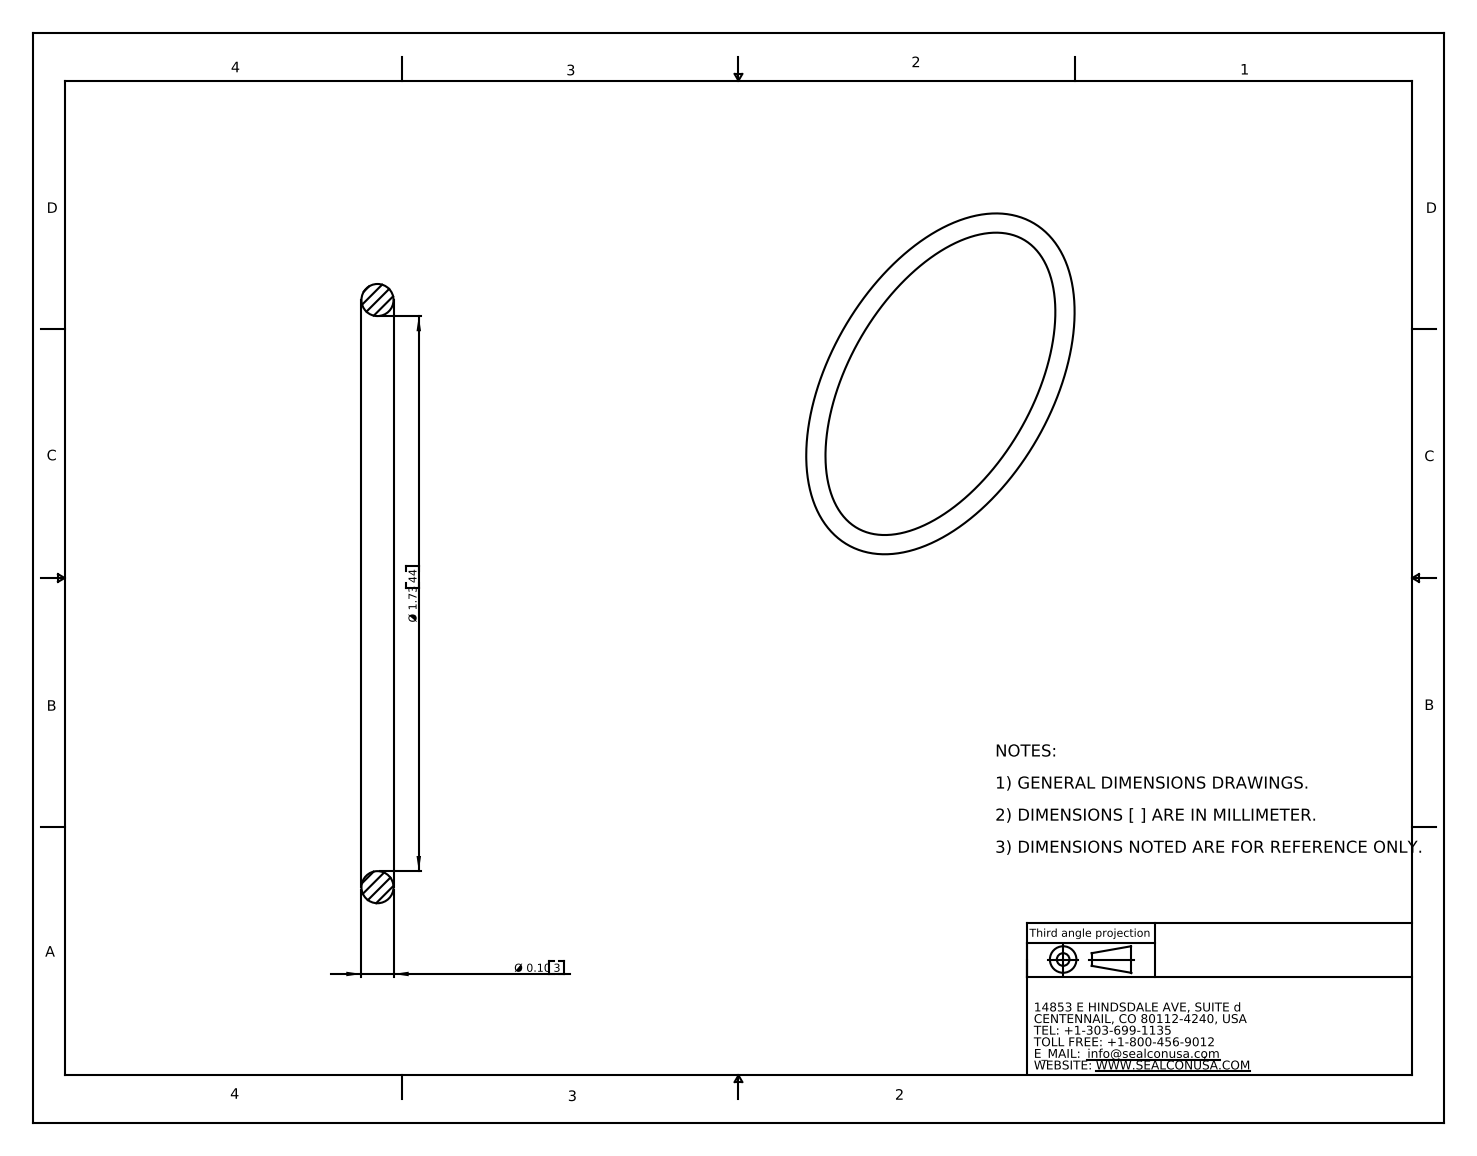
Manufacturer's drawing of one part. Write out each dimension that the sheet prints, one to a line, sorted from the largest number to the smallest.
Ø 1.73 44
Ø 0.10 3
